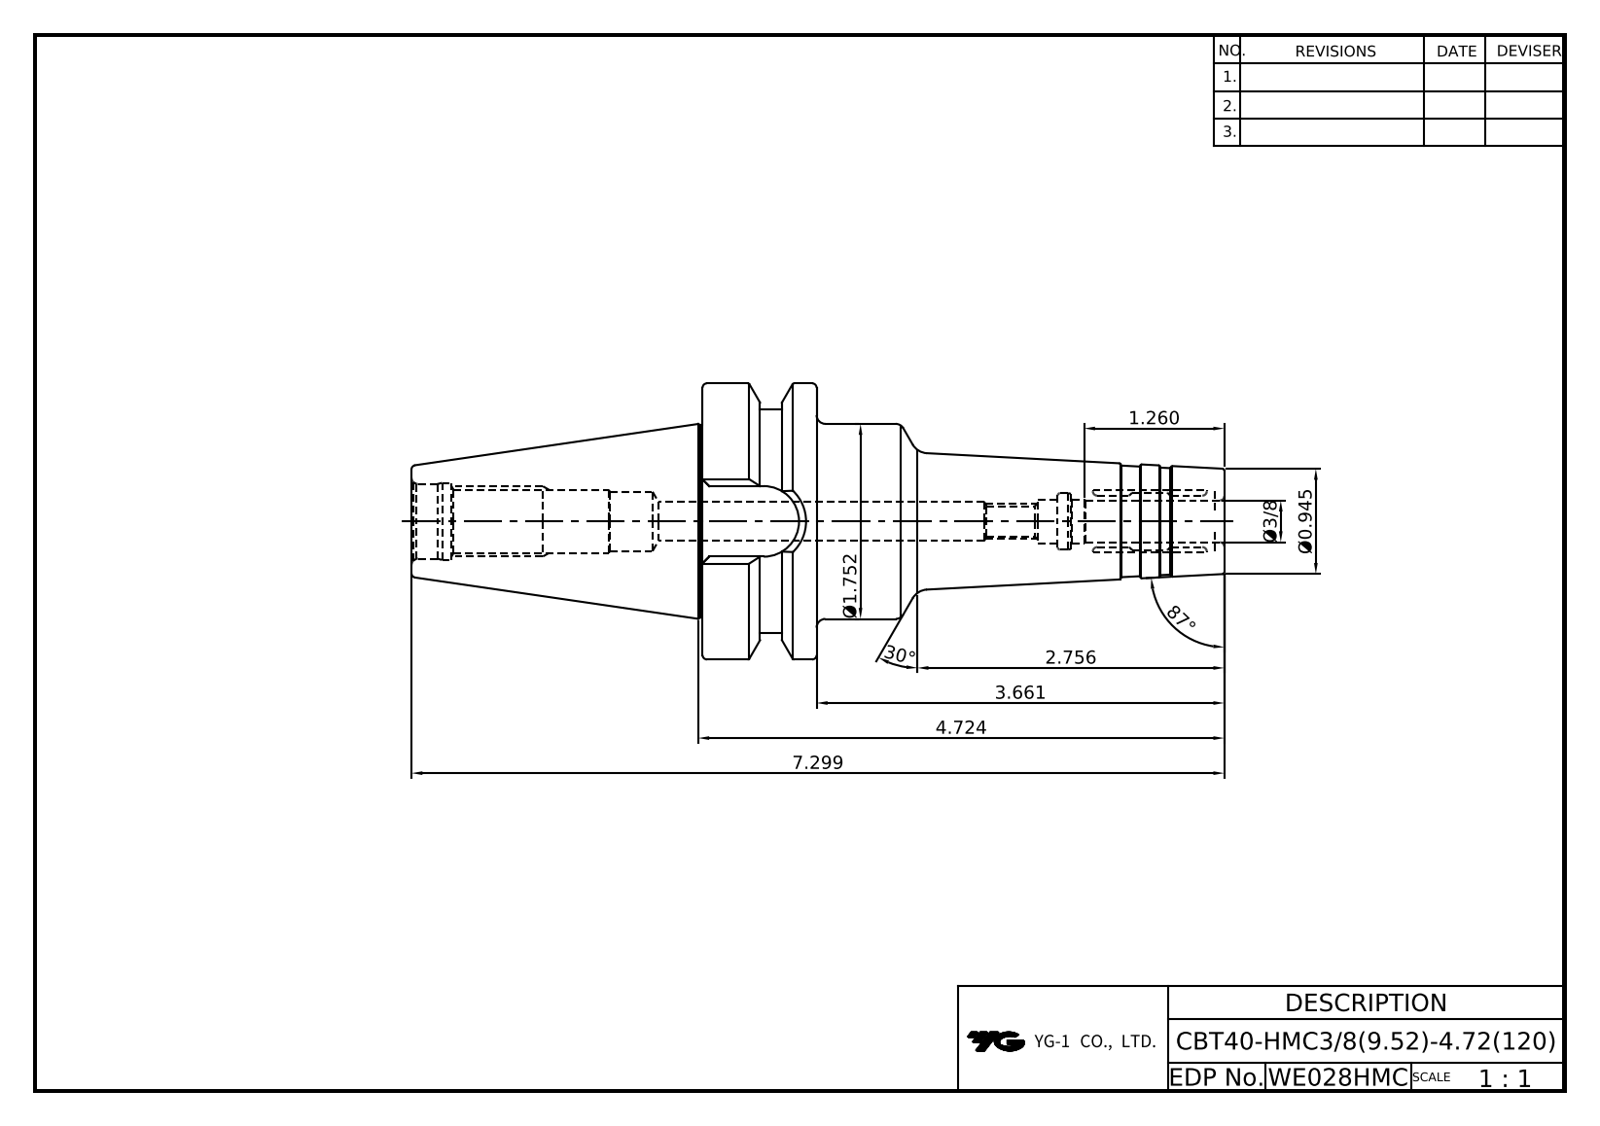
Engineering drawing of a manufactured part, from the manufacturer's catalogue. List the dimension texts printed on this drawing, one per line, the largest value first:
87°
30°
7.299
4.724
3.661
2.756
Ø1.752
1.260
Ø0.945
Ø3/8
